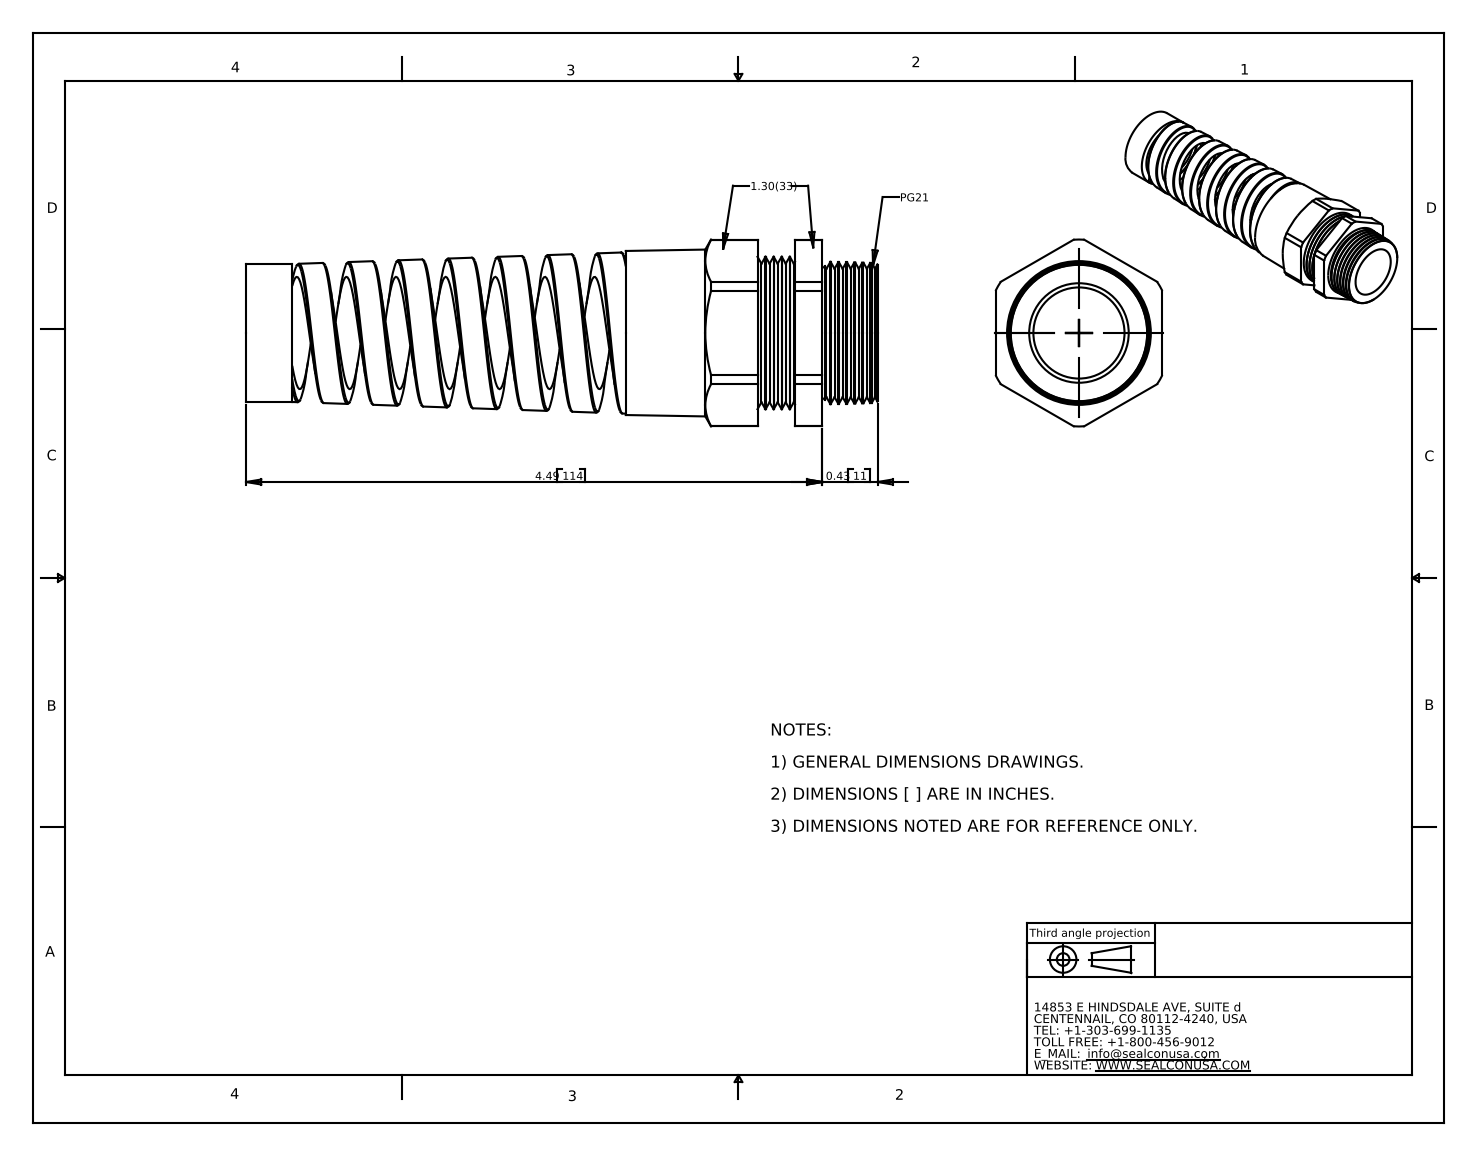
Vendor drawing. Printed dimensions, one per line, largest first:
4.49 114
0.43 11
